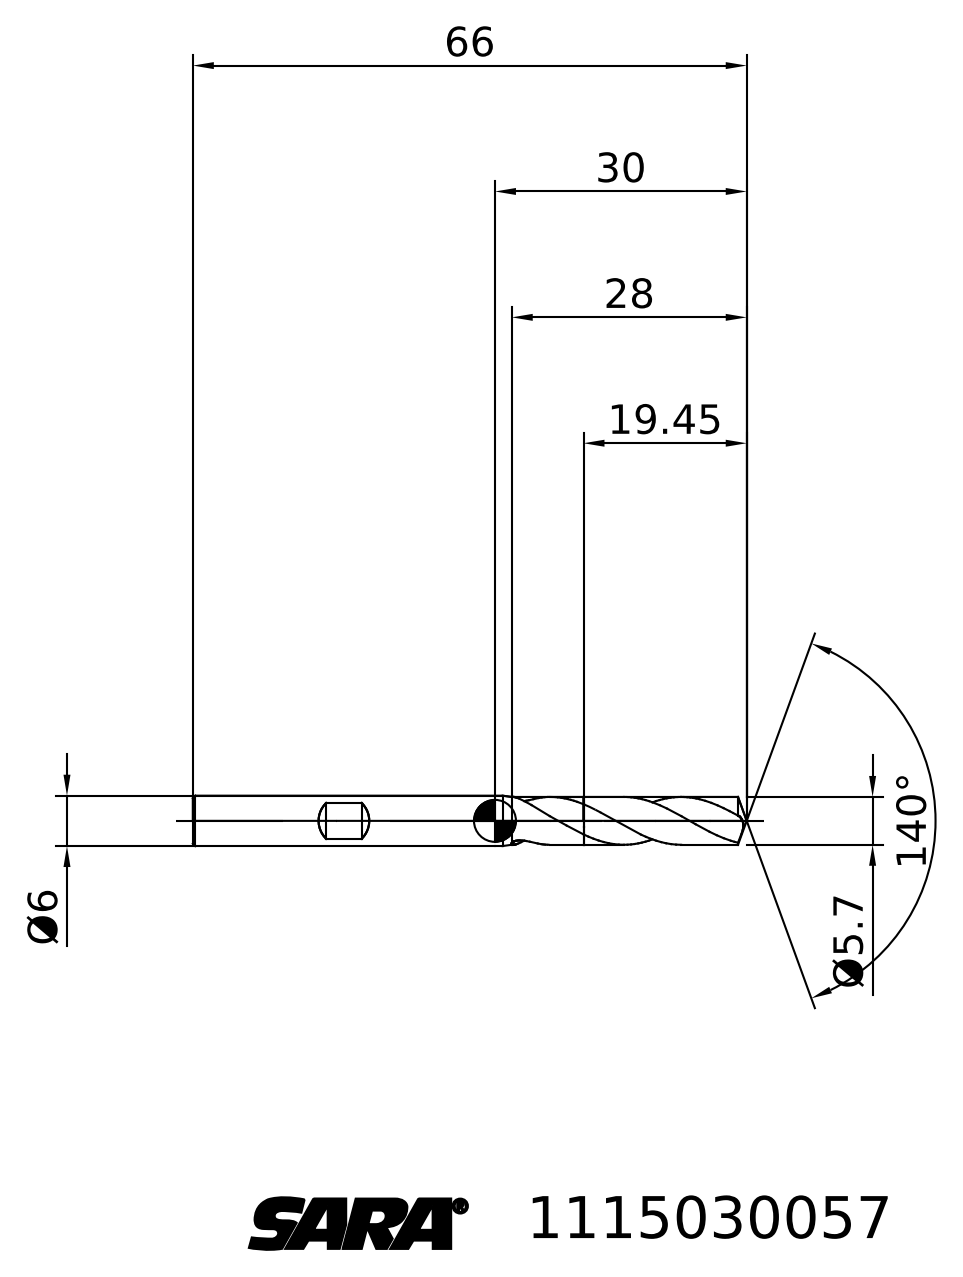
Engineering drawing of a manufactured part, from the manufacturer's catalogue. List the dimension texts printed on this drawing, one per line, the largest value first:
140°
66
30
28
19.45
Ø6
Ø5.7
